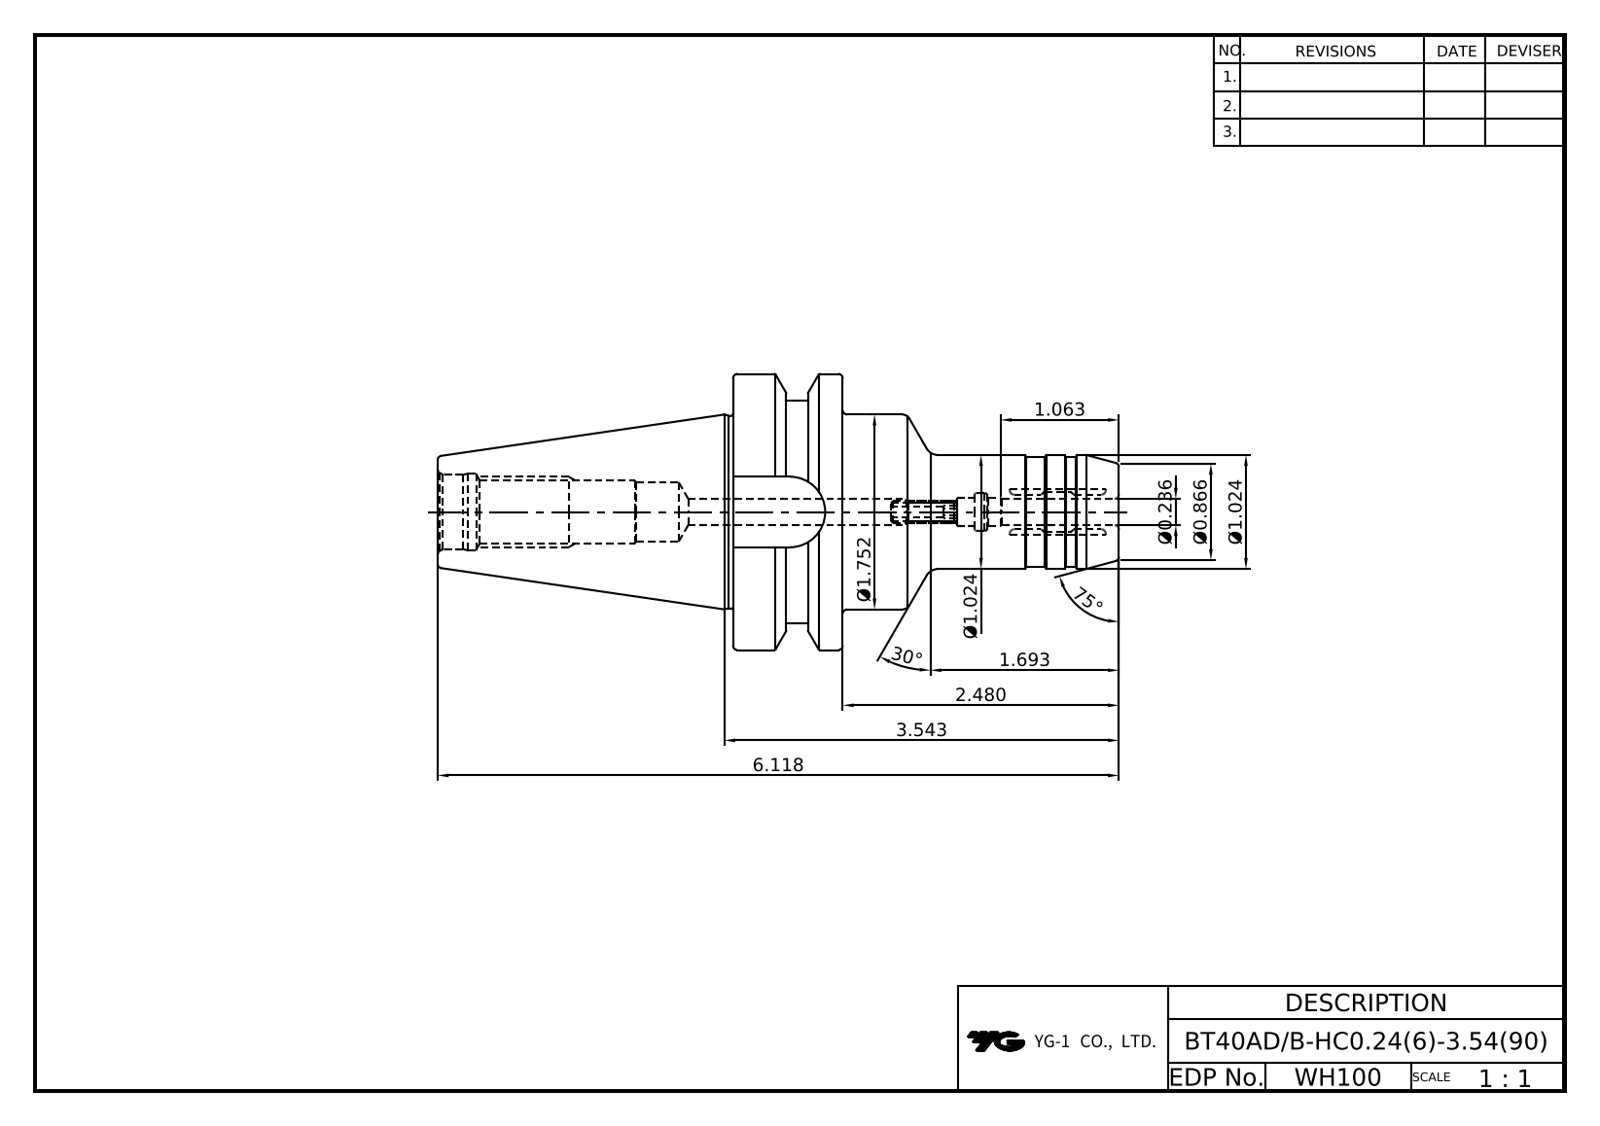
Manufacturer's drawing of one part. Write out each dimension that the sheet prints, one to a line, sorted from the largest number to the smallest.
75°
30°
6.118
3.543
2.480
Ø1.752
1.693
1.063
Ø1.024
Ø1.024
Ø0.866
Ø0.236
